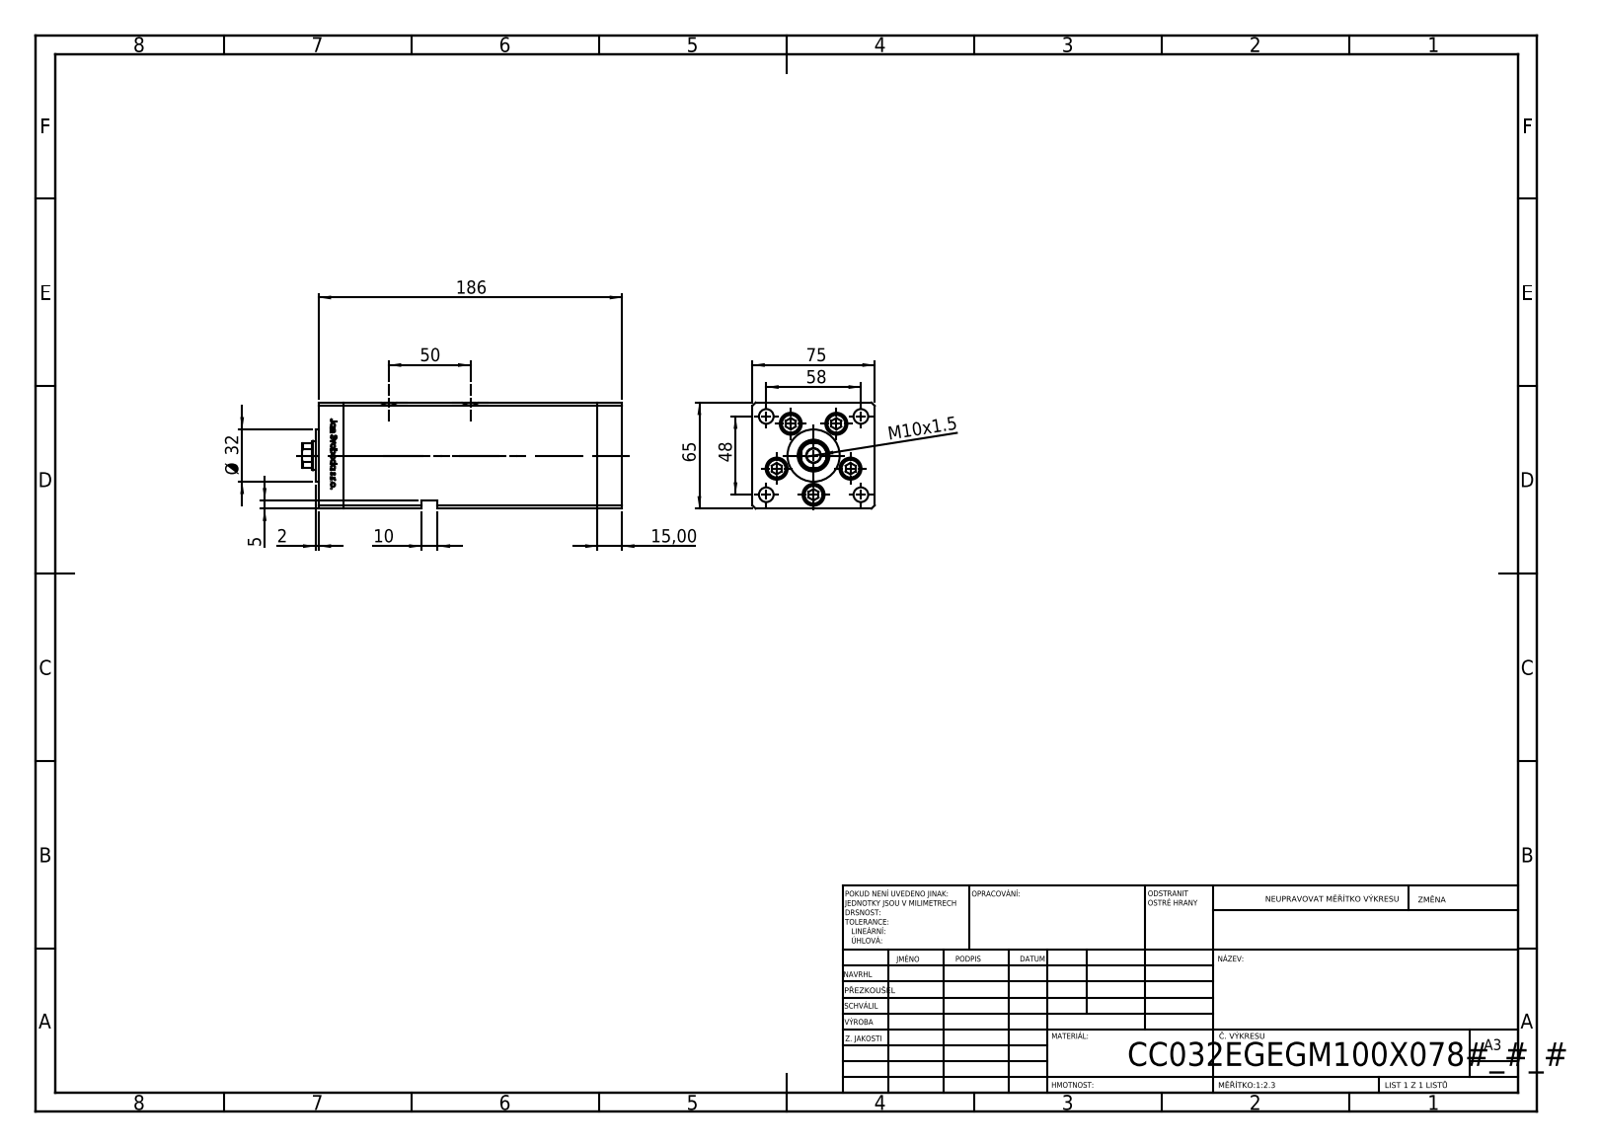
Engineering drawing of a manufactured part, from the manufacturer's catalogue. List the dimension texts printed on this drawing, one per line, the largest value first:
186
75
65
58
50
48
Ø 32
15,00
10
M10x1.5
5
2
